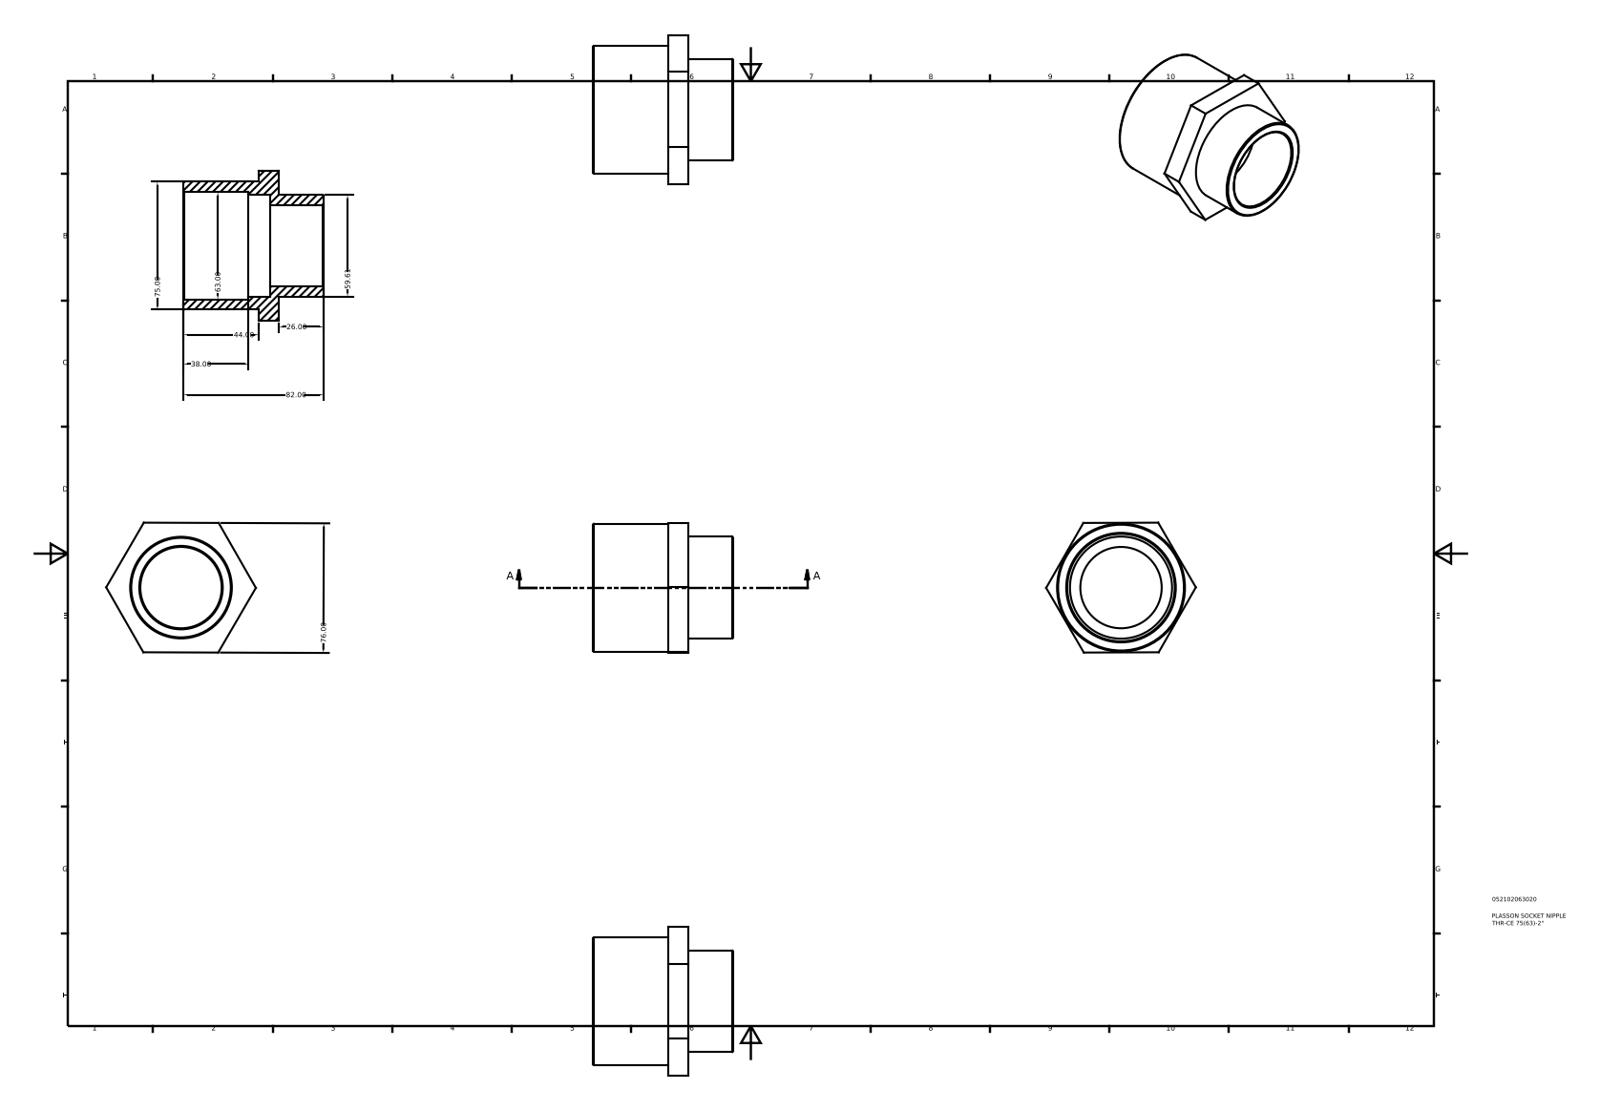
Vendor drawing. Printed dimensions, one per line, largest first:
82.00
76.00
75.00
63.00
59.61
44.00
38.00
26.00
